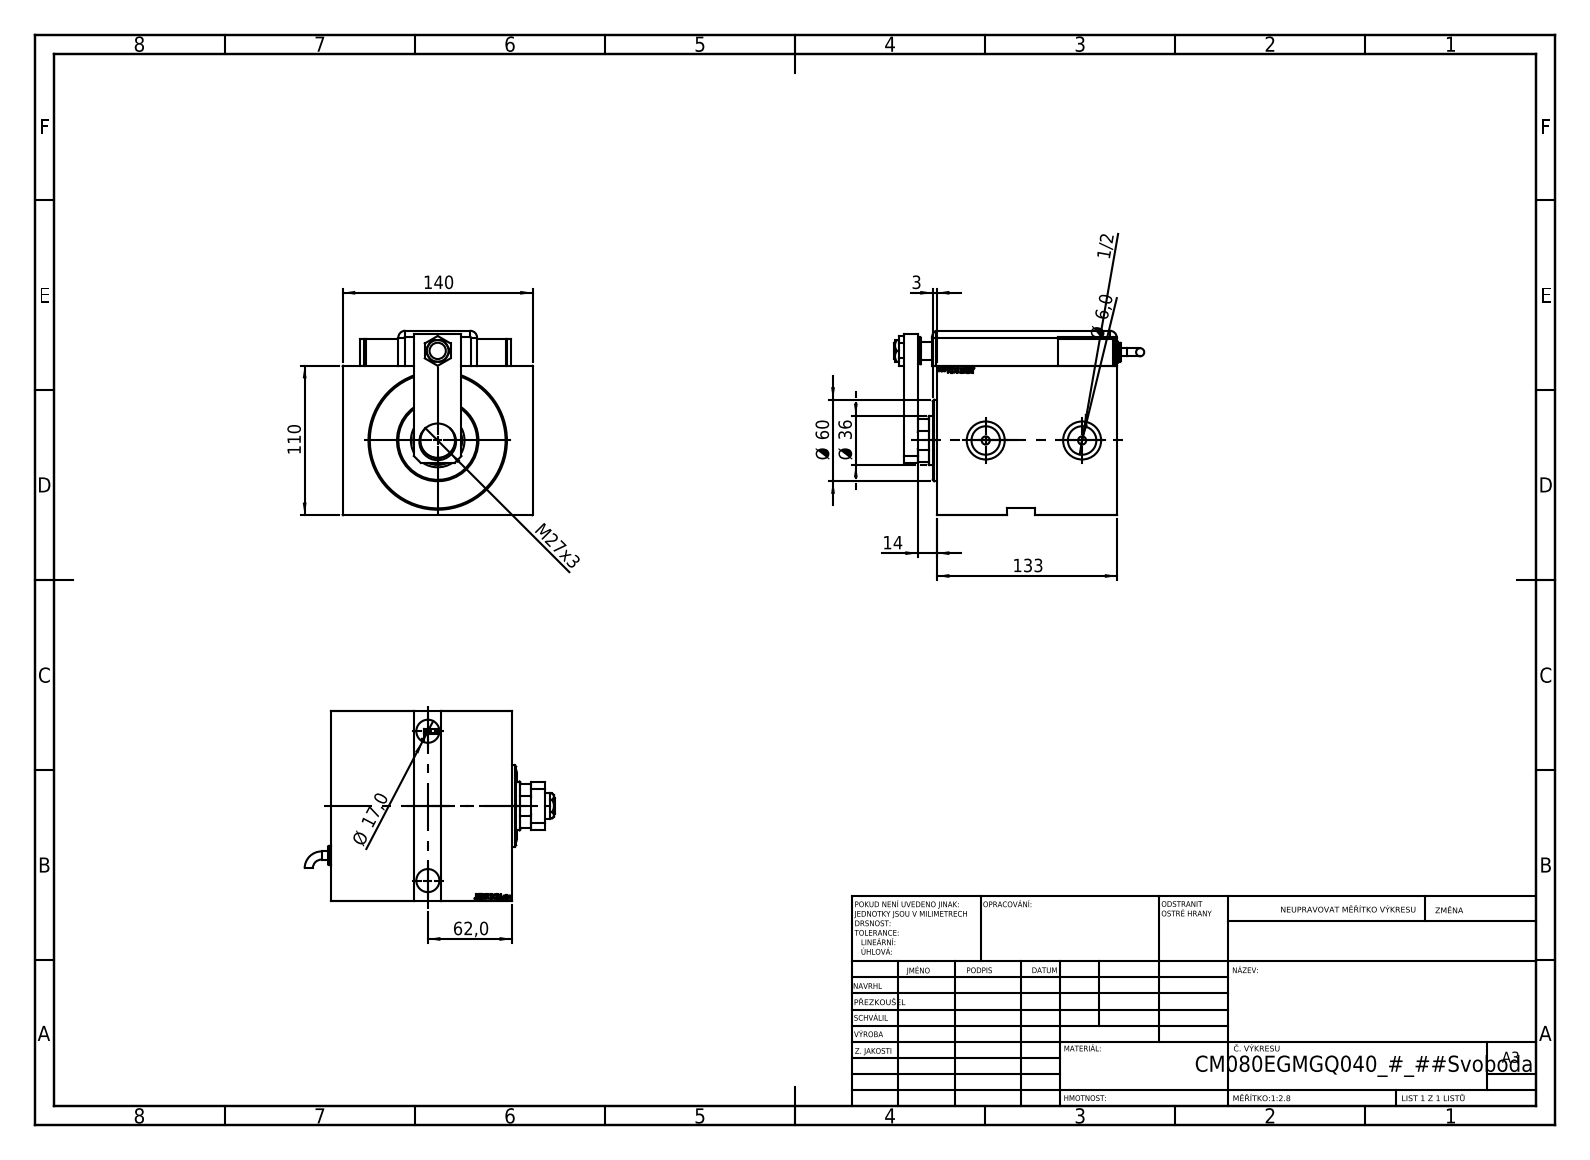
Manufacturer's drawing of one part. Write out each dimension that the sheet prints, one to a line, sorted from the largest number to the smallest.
140
133
110
62,0
Ø 60
Ø 36
M27x3
Ø 17,0
14
Ø 6,0
3
1/2
